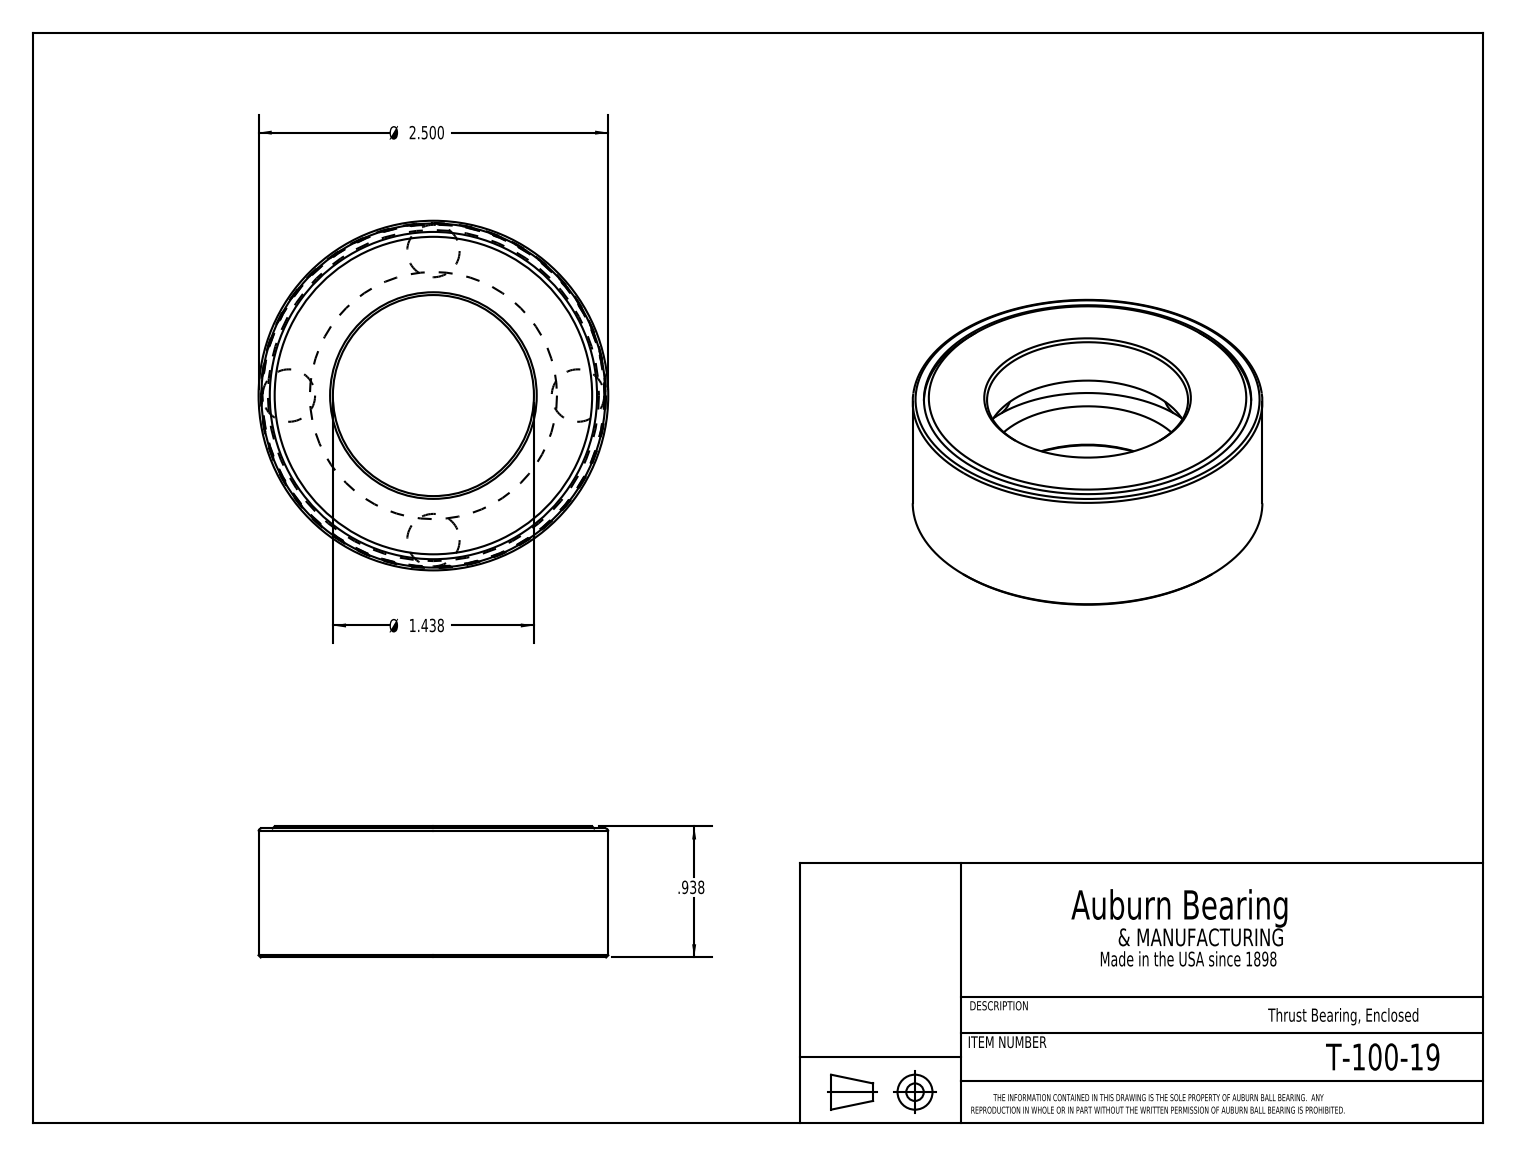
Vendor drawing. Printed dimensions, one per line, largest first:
Ø 2.500
Ø 1.438
.938
